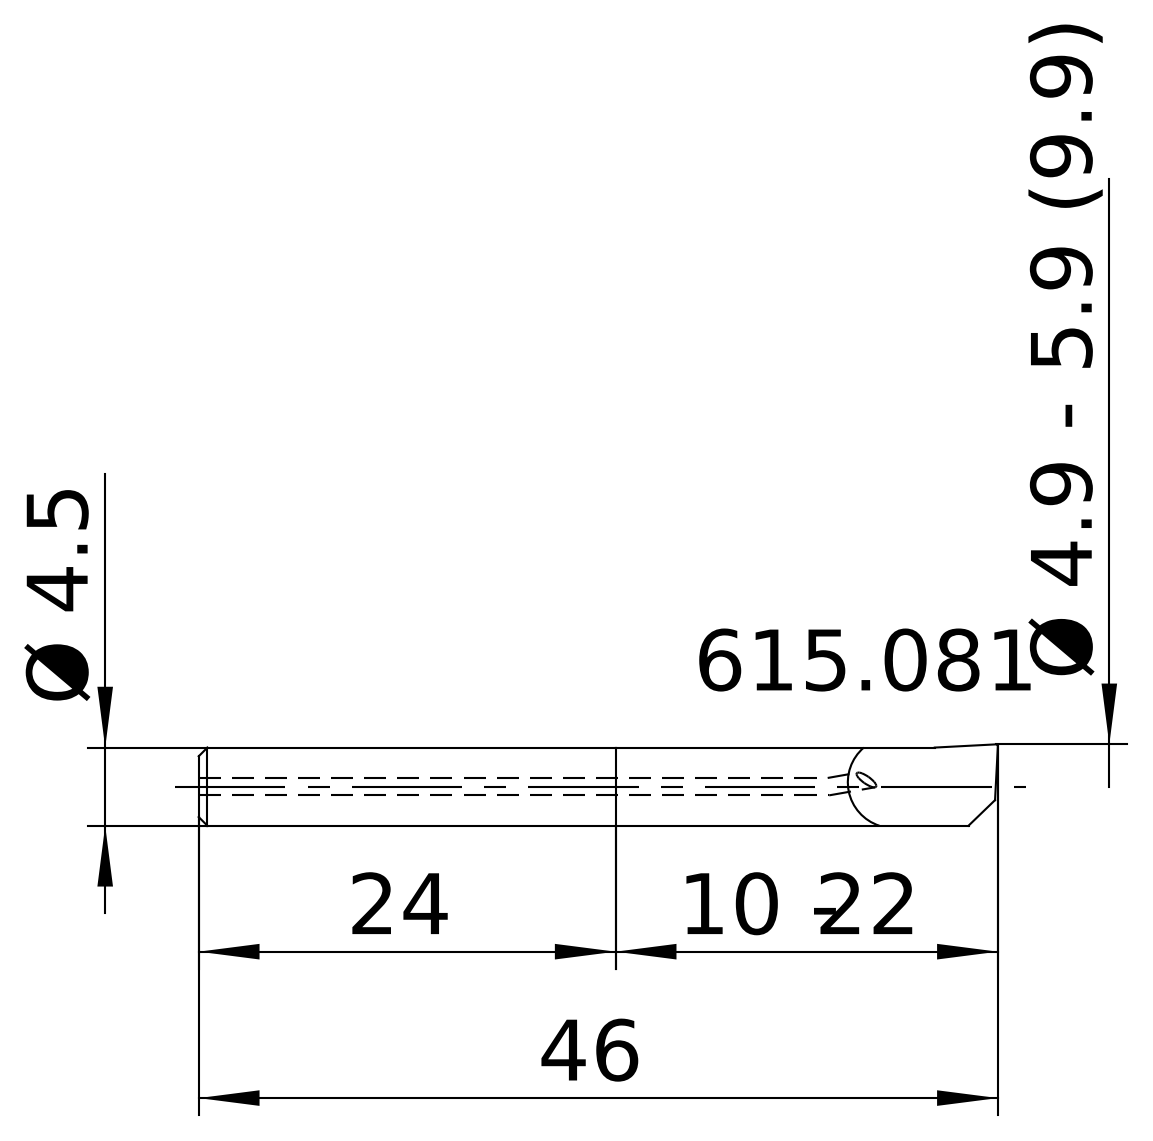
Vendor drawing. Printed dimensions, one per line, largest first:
46
24
10 - 22
Ø 4.9 - 5.9 (9.9)
Ø 4.5
